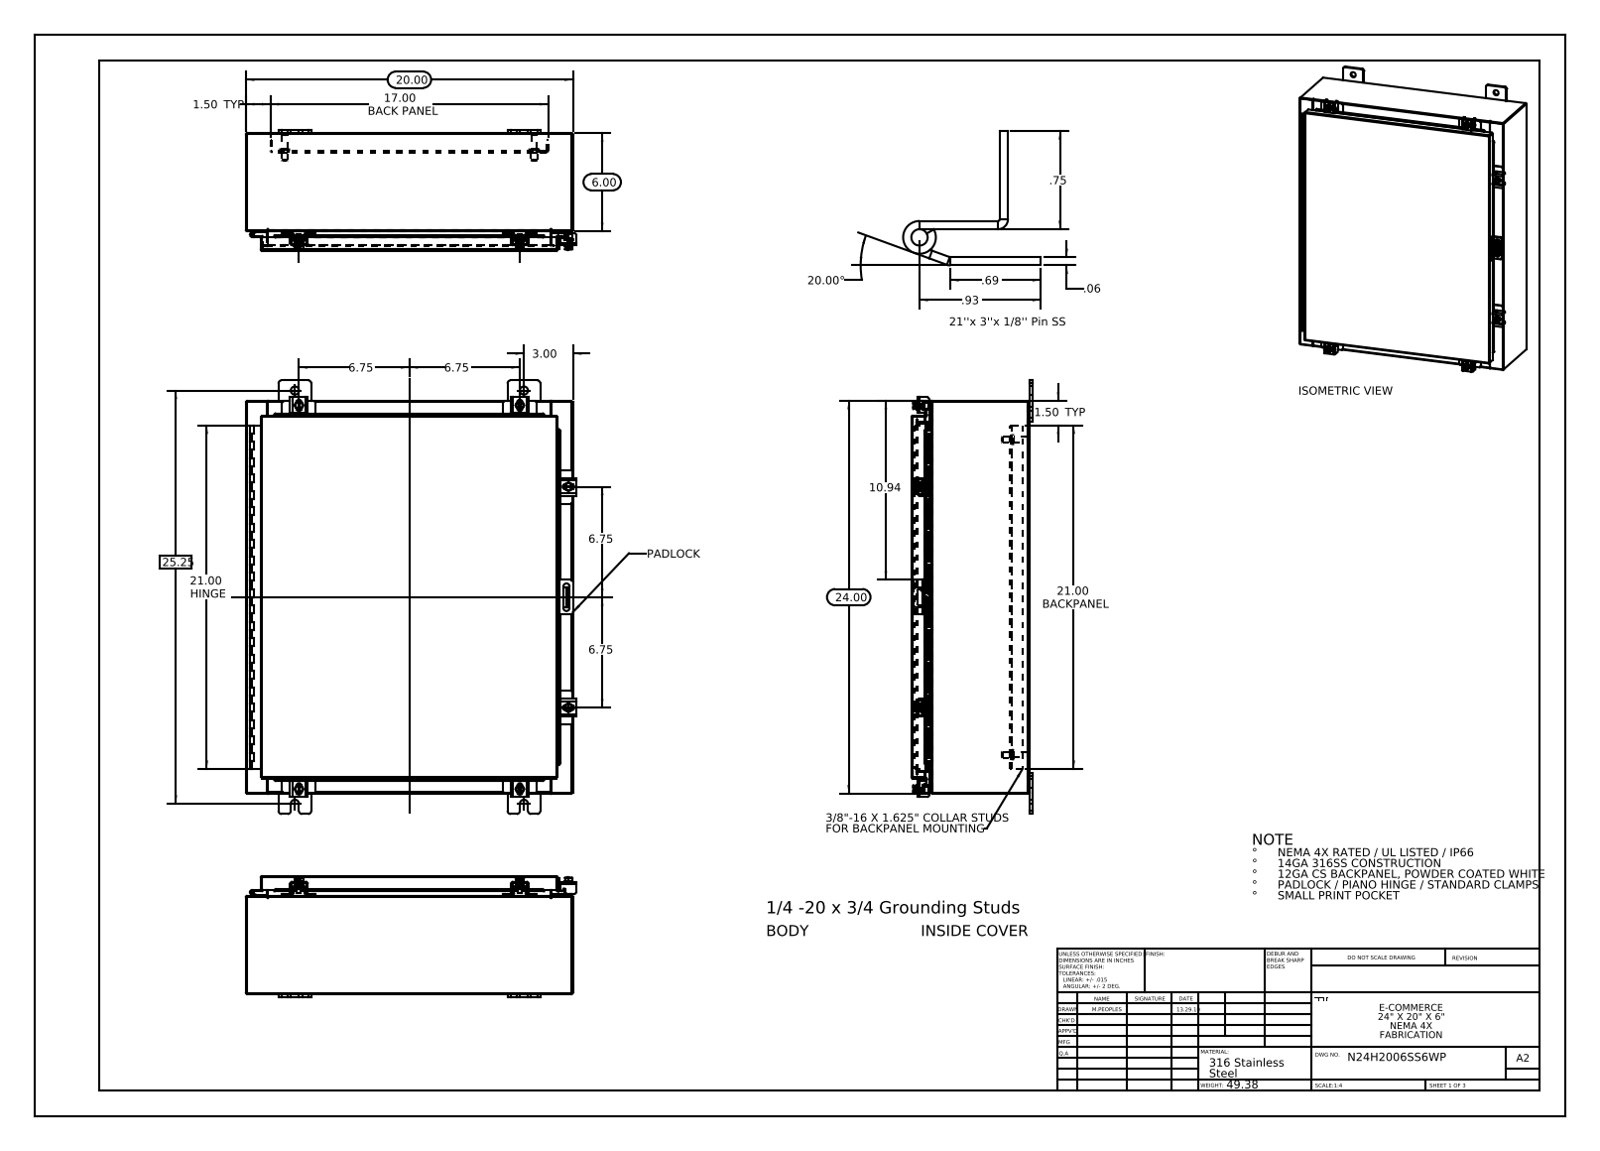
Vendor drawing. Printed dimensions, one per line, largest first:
25.25
24.00
21.00 HINGE
21.00 BACKPANEL
20.00
20.00°
17.00 BACK PANEL
10.94
6.75
6.75
6.75
6.75
6.00
3.00
1.50 TYP
1.50 TYP
.93
.75
.69
.06
